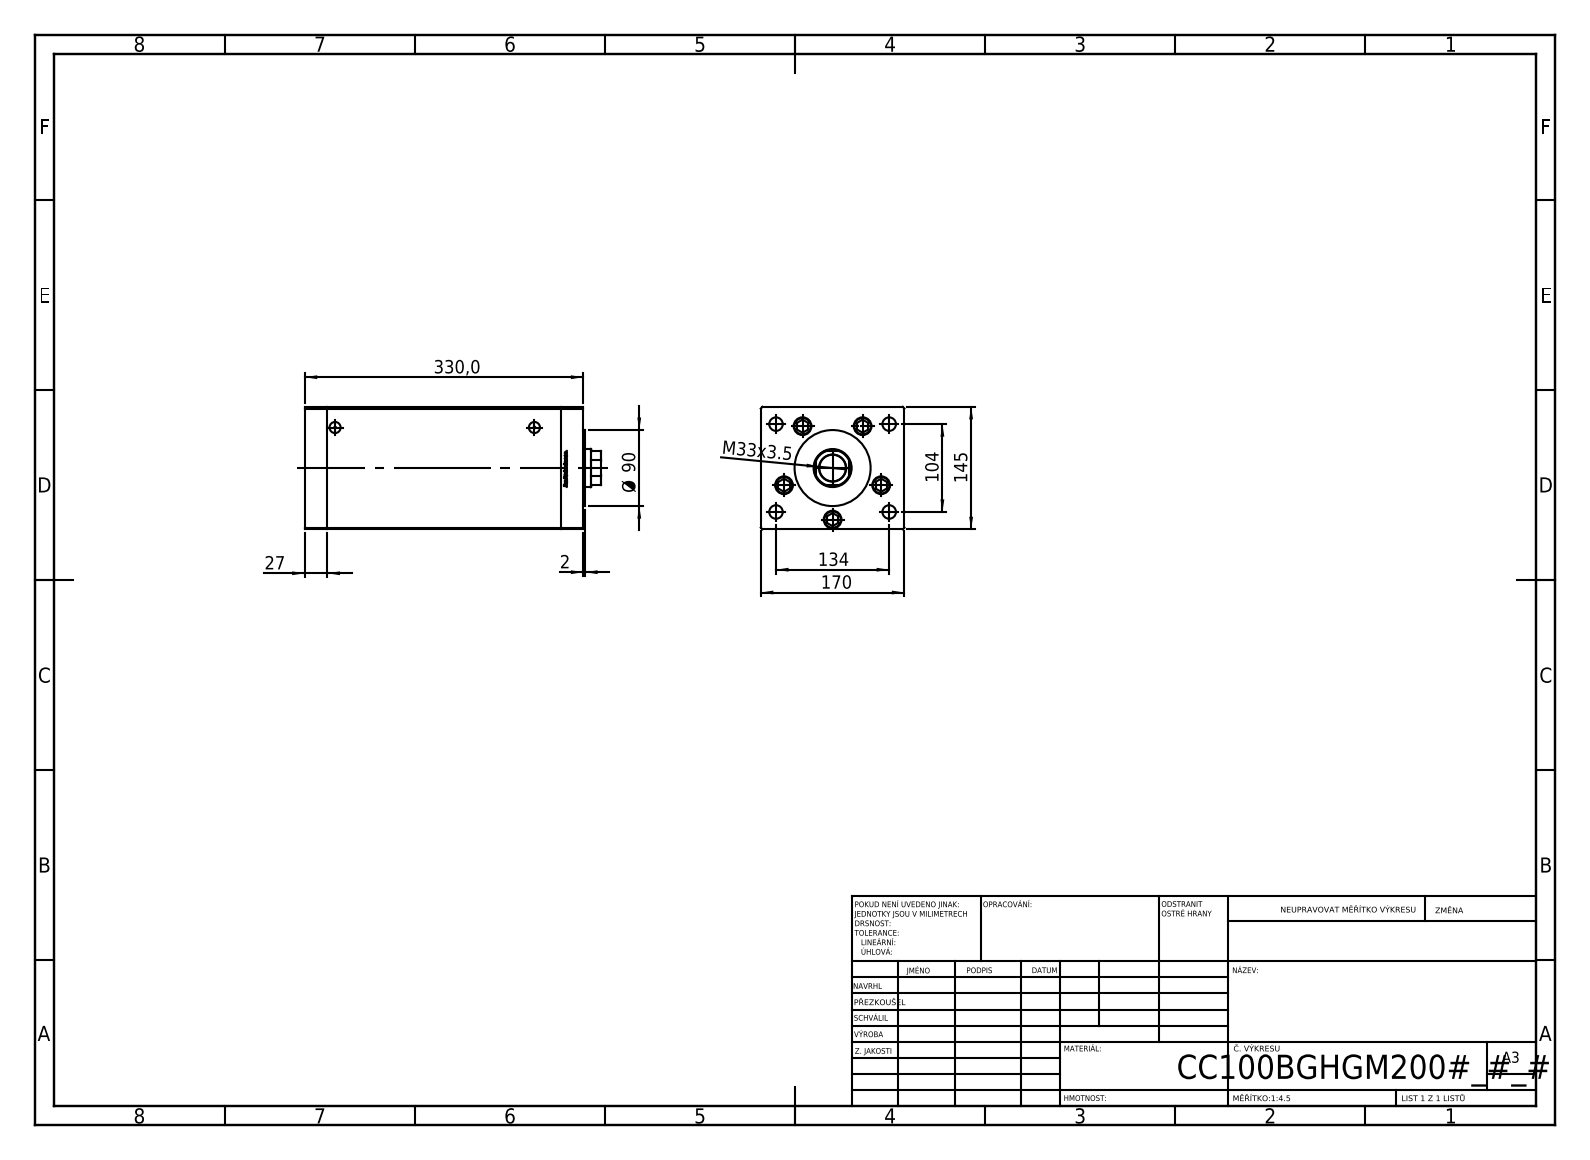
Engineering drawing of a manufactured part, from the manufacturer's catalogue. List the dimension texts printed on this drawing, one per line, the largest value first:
330,0
170
145
134
104
Ø 90
M33x3.5
27
2
